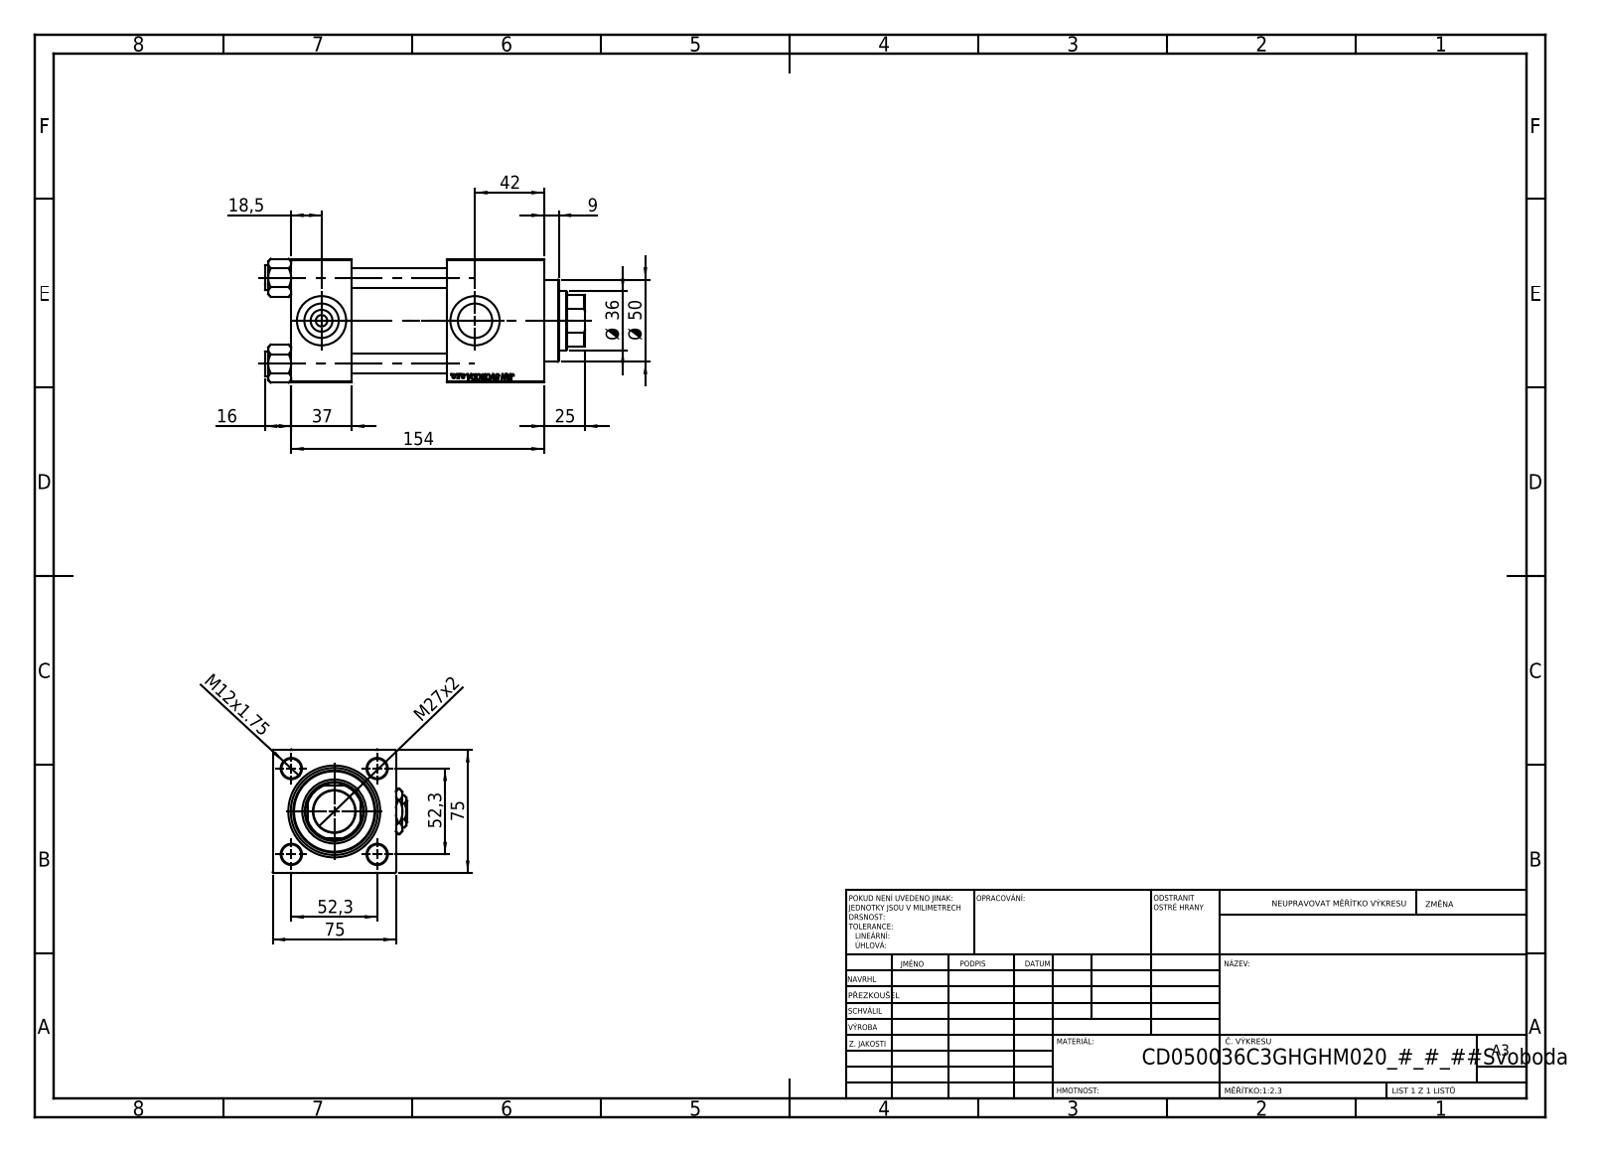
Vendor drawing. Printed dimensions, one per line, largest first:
154
75
75
52,3
52,3
Ø 50
42
37
Ø 36
M27x2
25
18,5
16
M12x1.75
9
